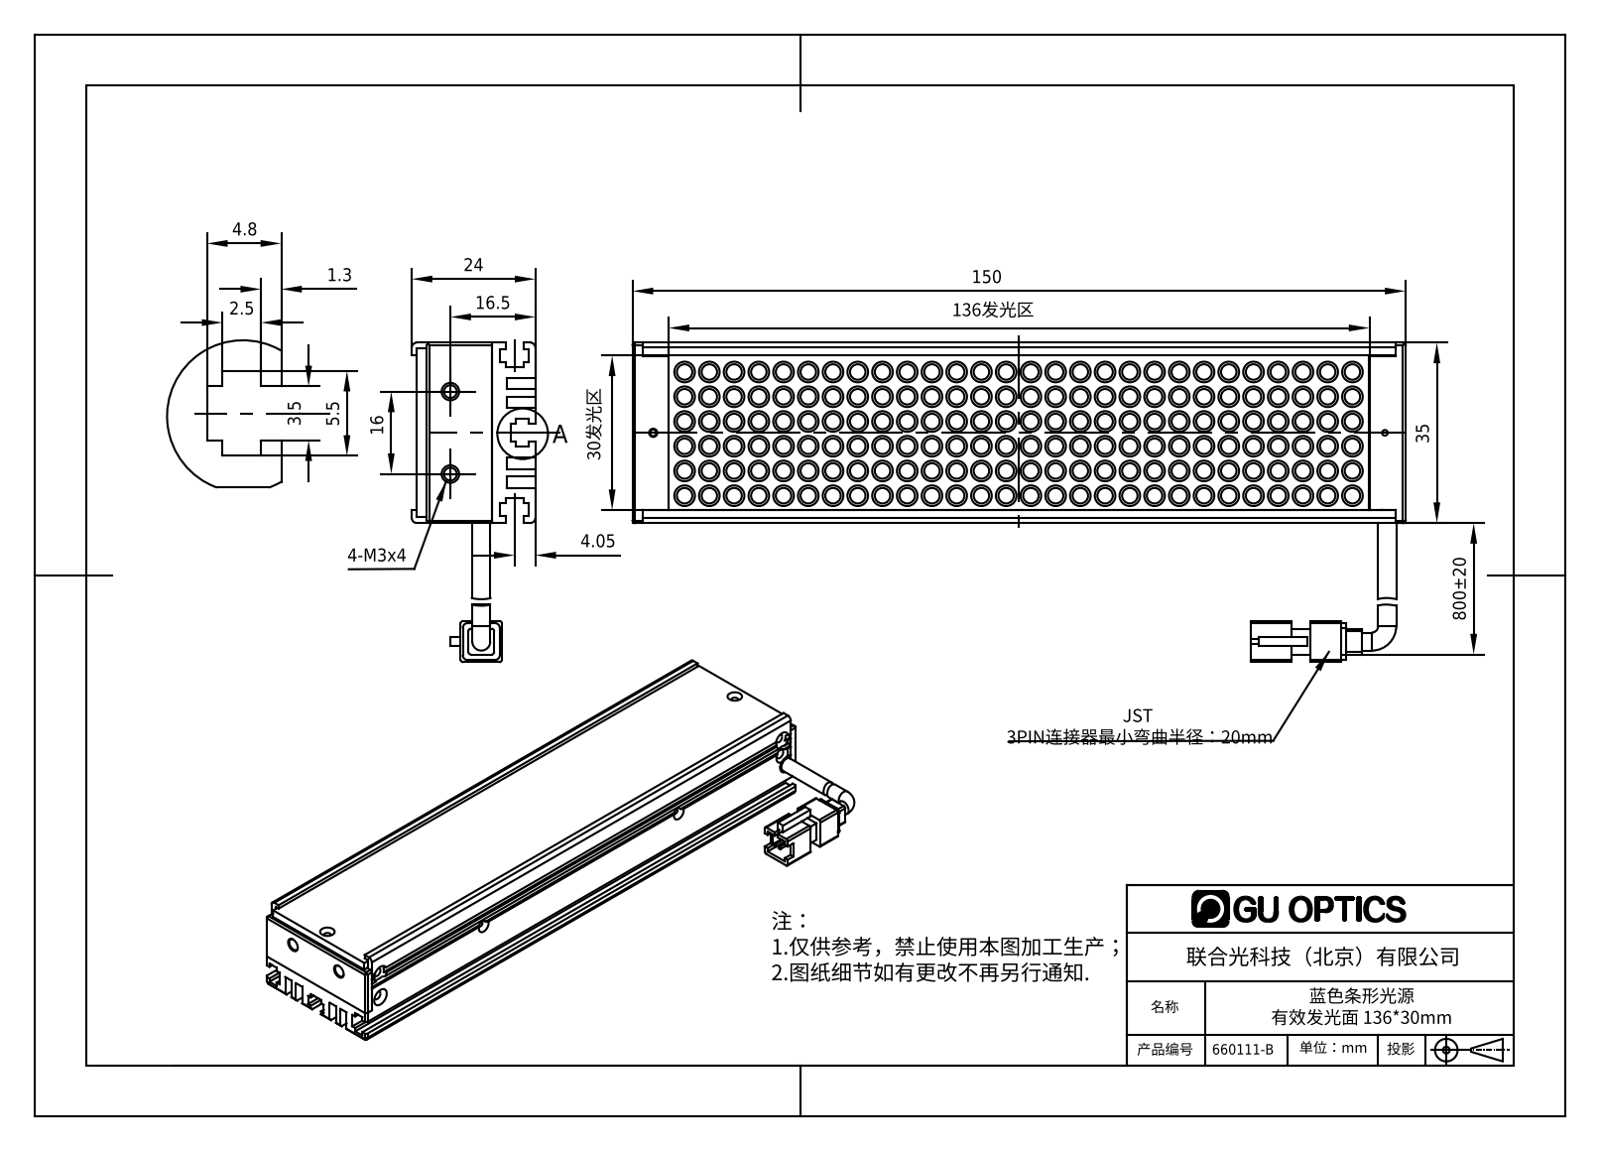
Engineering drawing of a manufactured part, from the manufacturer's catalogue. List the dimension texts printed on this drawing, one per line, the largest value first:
800±20
150
136发光区
35
30发光区
24
16.5
16
5.5
4.8
4.05
3.5
2.5
1.3
